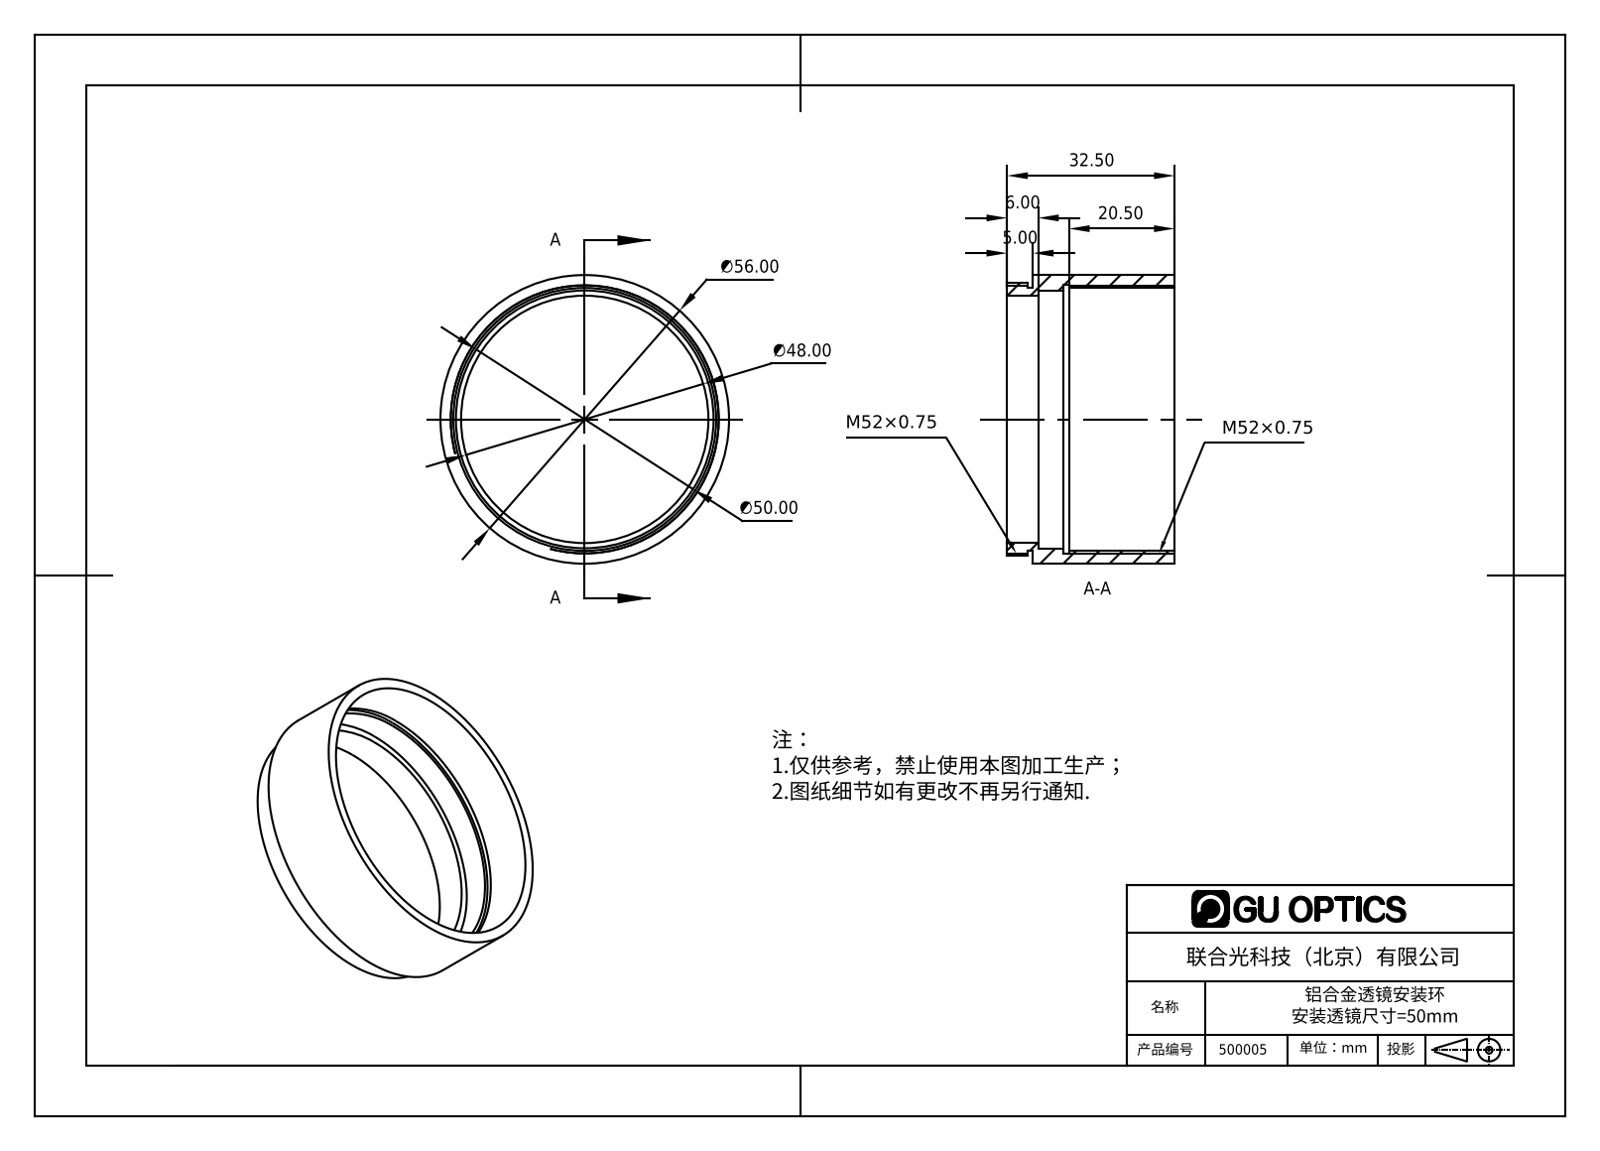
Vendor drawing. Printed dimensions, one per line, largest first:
∅56.00
∅50.00
∅48.00
32.50
20.50
6.00
5.00
